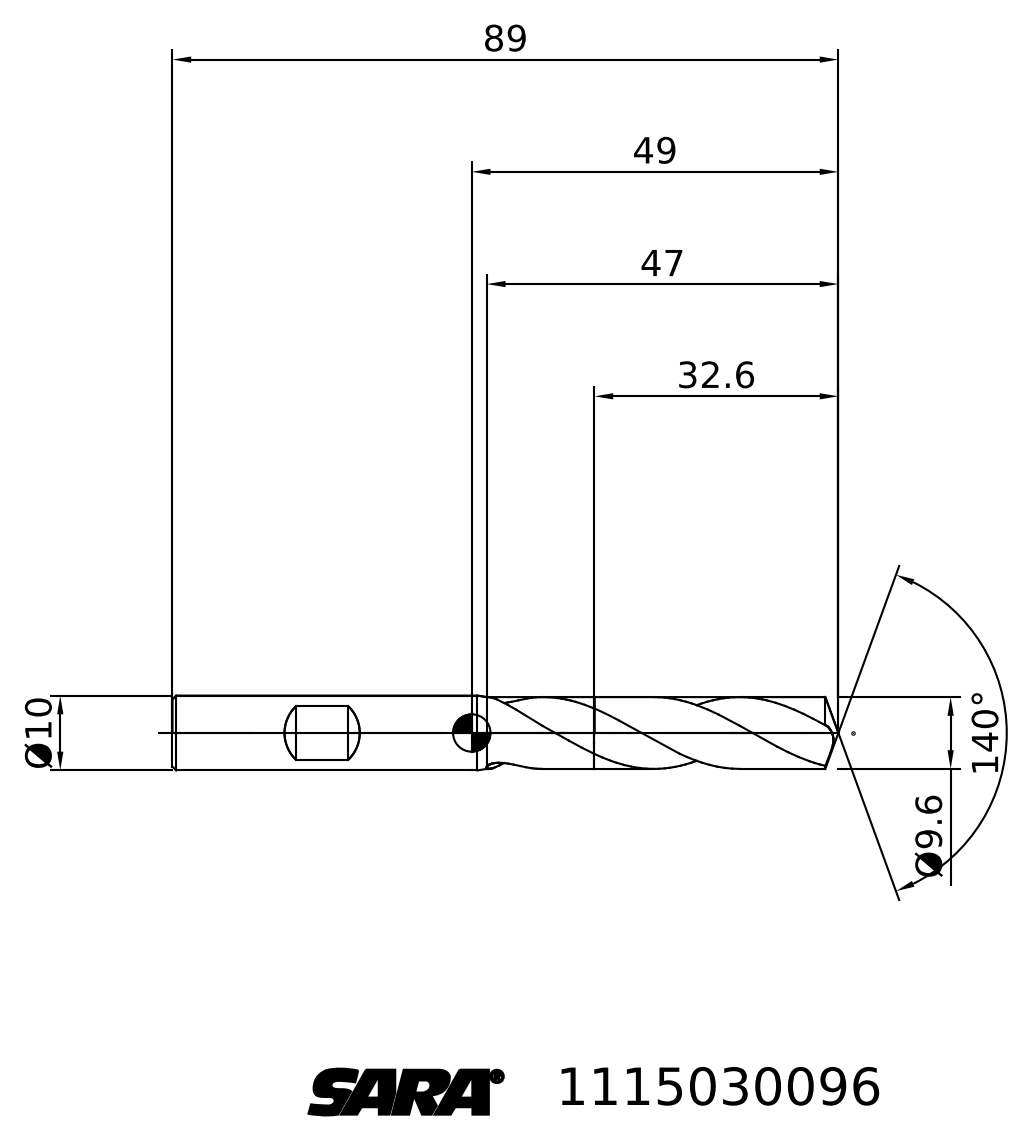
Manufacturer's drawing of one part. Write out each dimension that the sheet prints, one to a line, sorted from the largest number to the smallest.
140°
89
49
47
32.6
Ø10
Ø9.6
